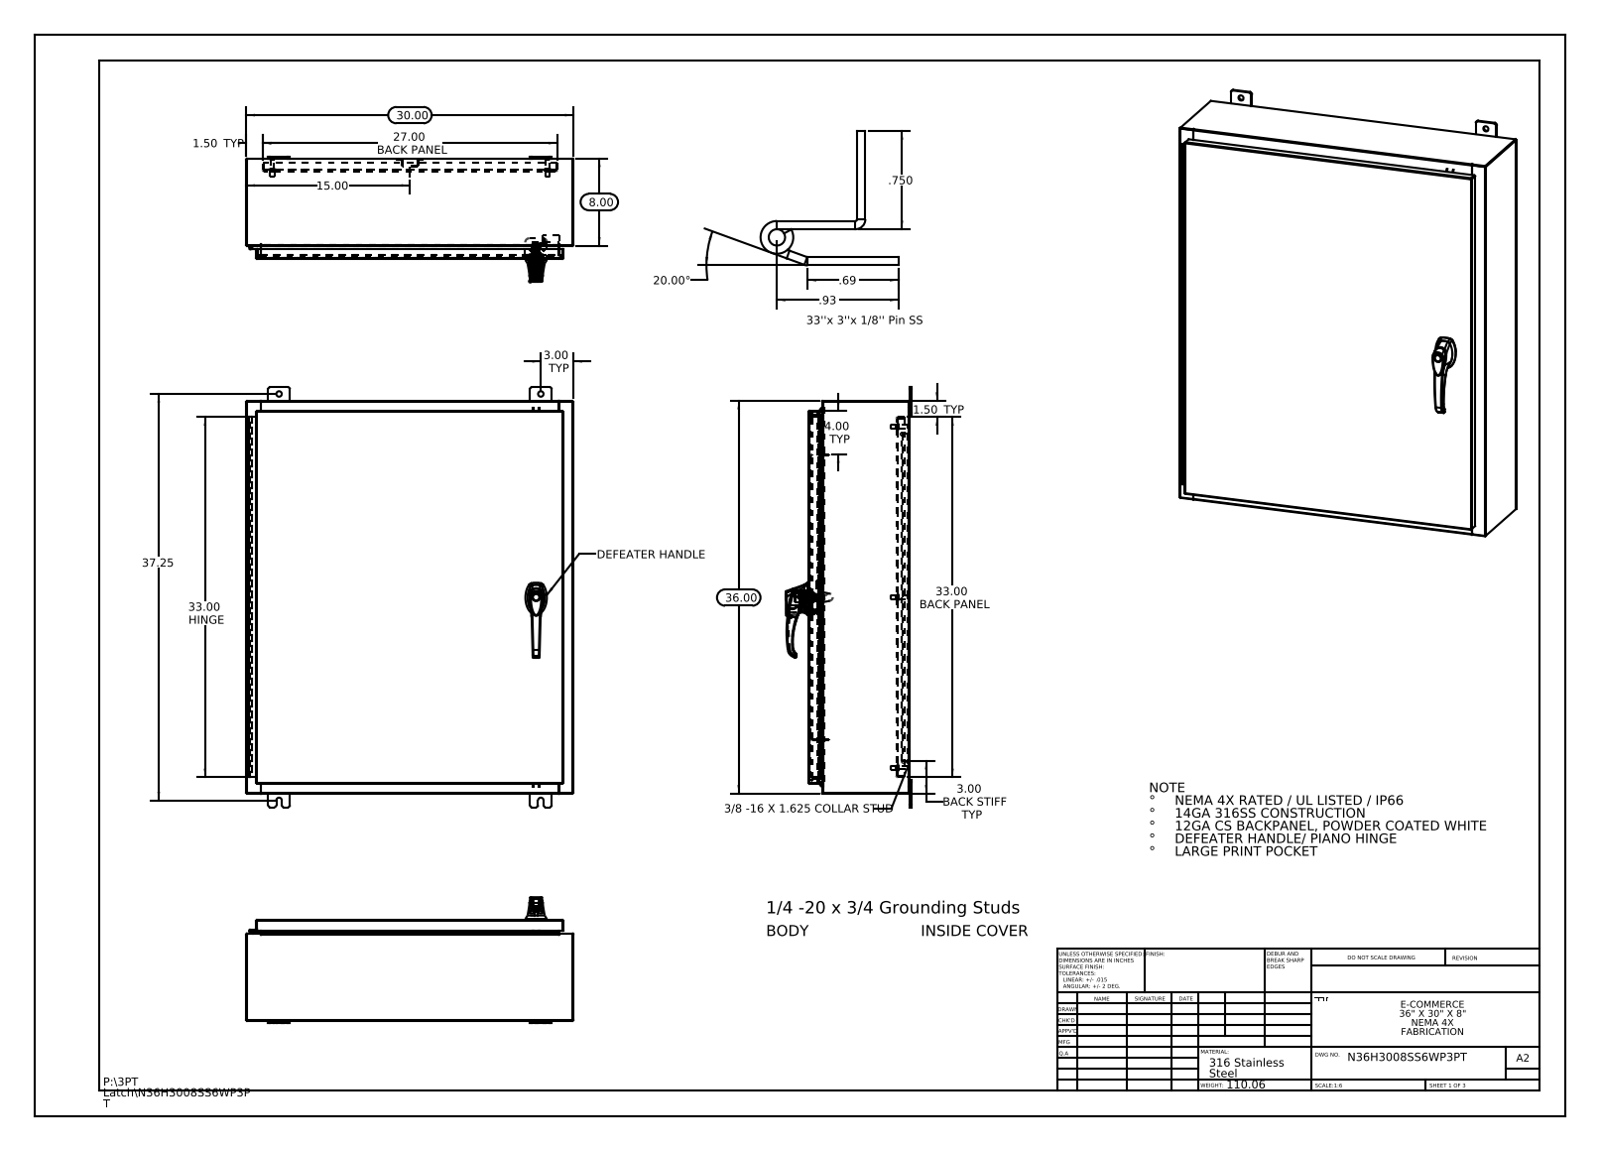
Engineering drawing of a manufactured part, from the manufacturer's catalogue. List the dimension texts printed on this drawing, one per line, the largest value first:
37.25
36.00
33.00 HINGE
33.00 BACK PANEL
30.00
27.00 BACK PANEL
20.00°
15.00
8.00
4.00 TYP
3.00 TYP
3.00 BACK STIFF TYP
1.50 TYP
1.50 TYP
.93
.750
.69
